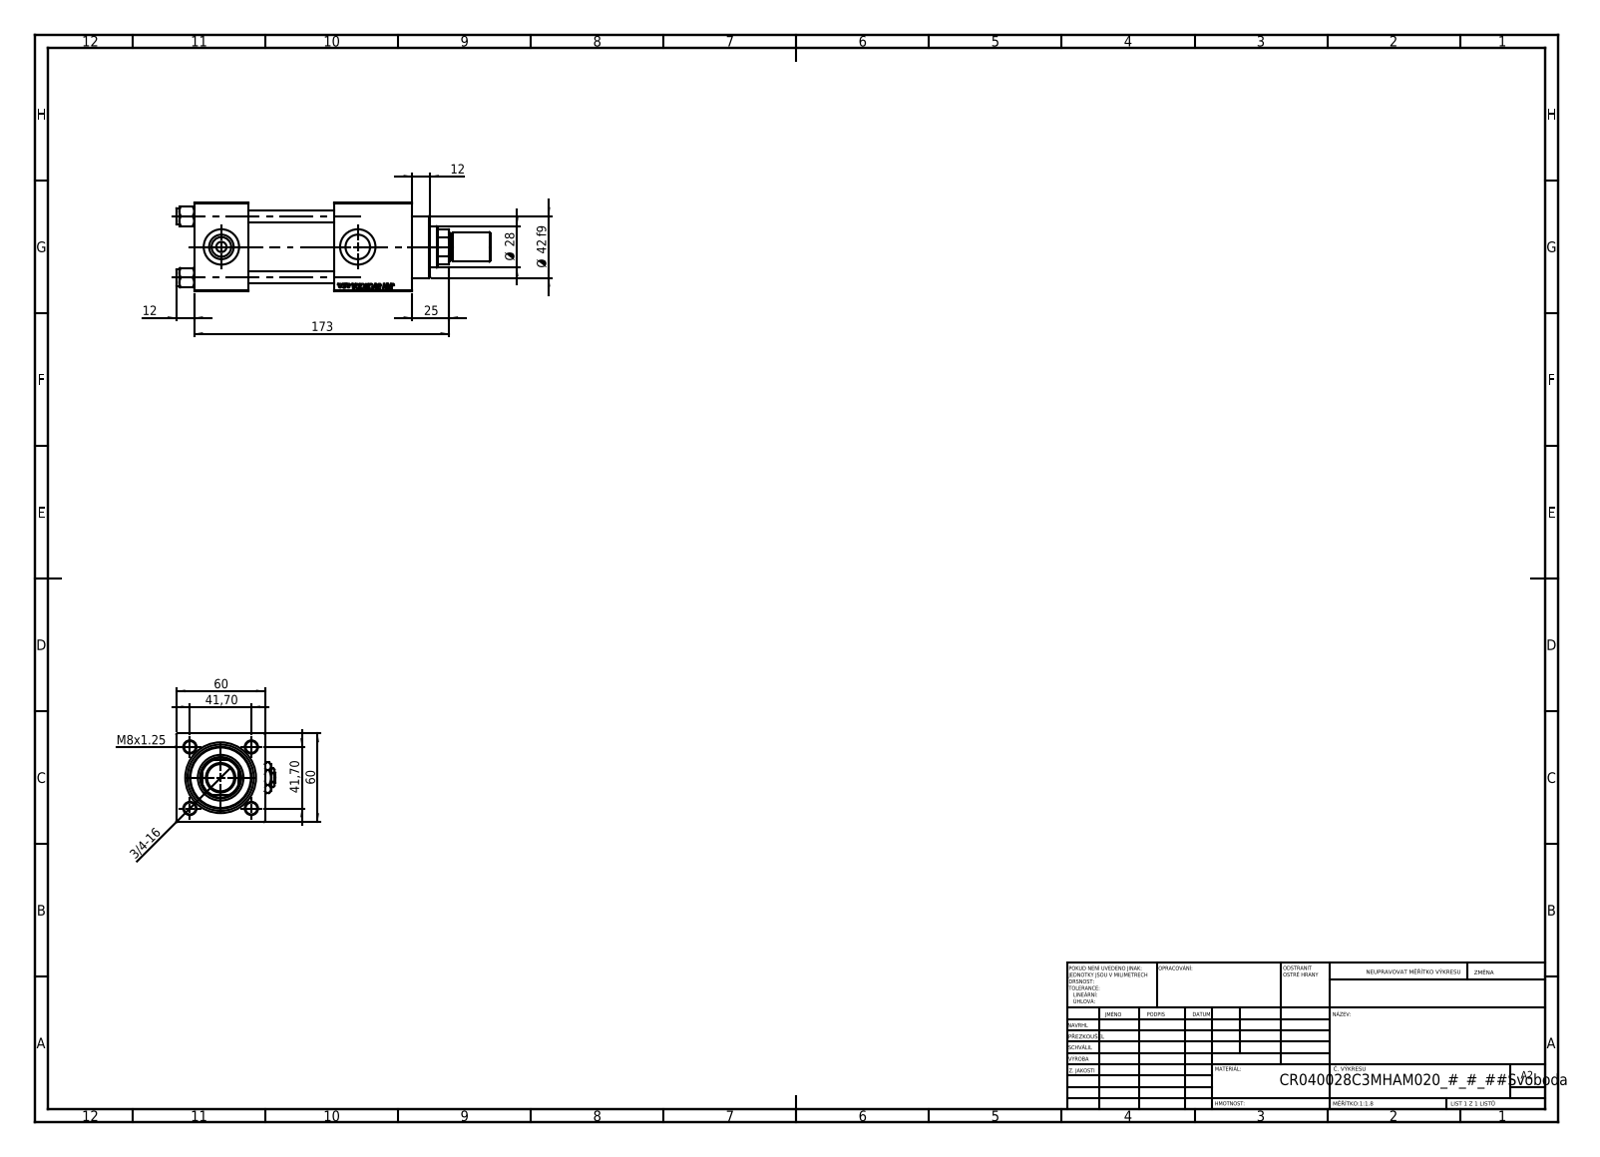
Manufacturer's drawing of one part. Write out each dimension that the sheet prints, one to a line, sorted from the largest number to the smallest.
173
60
60
Ø 42 f9
41,70
41,70
Ø 28
25
12
12
M8x1.25
3/4-16
